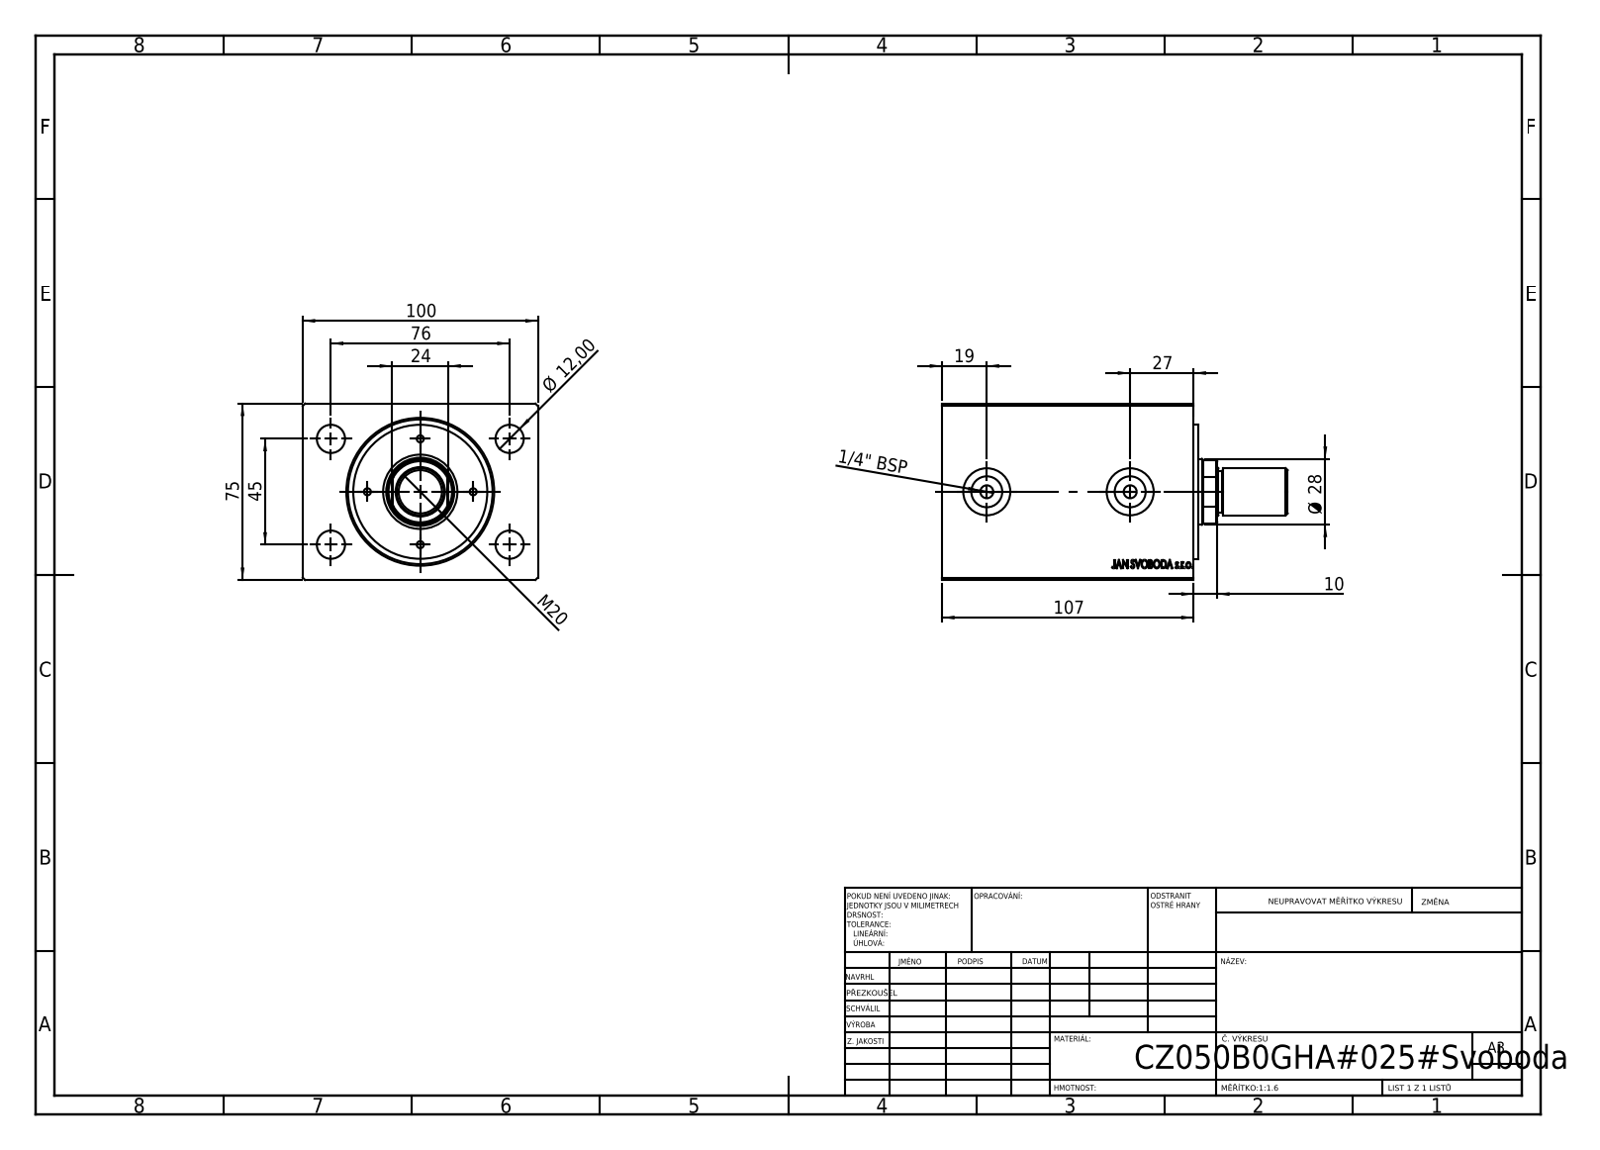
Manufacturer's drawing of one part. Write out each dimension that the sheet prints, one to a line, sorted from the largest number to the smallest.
107
100
76
75
45
Ø 28
27
24
M20
19
Ø 12,00
10
1/4" BSP
